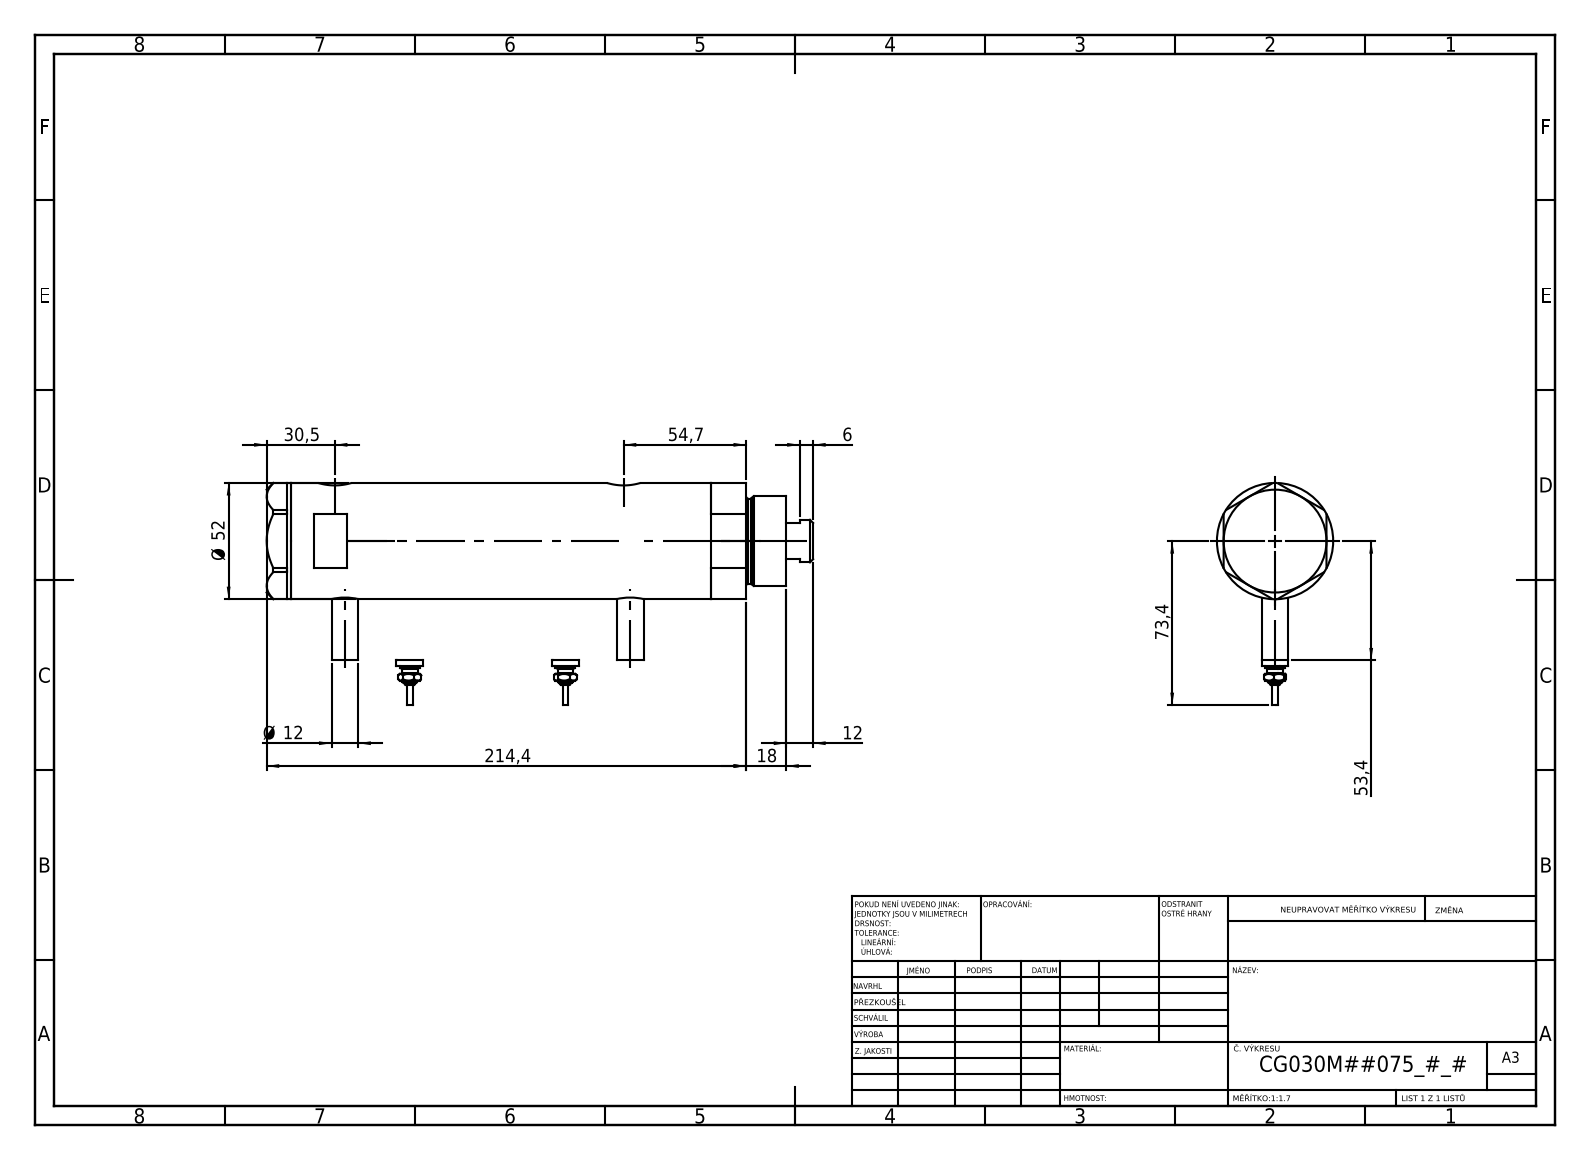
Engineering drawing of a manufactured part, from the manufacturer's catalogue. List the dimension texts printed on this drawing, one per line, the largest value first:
214,4
73,4
54,7
53,4
Ø 52
30,5
18
12
Ø 12
6
